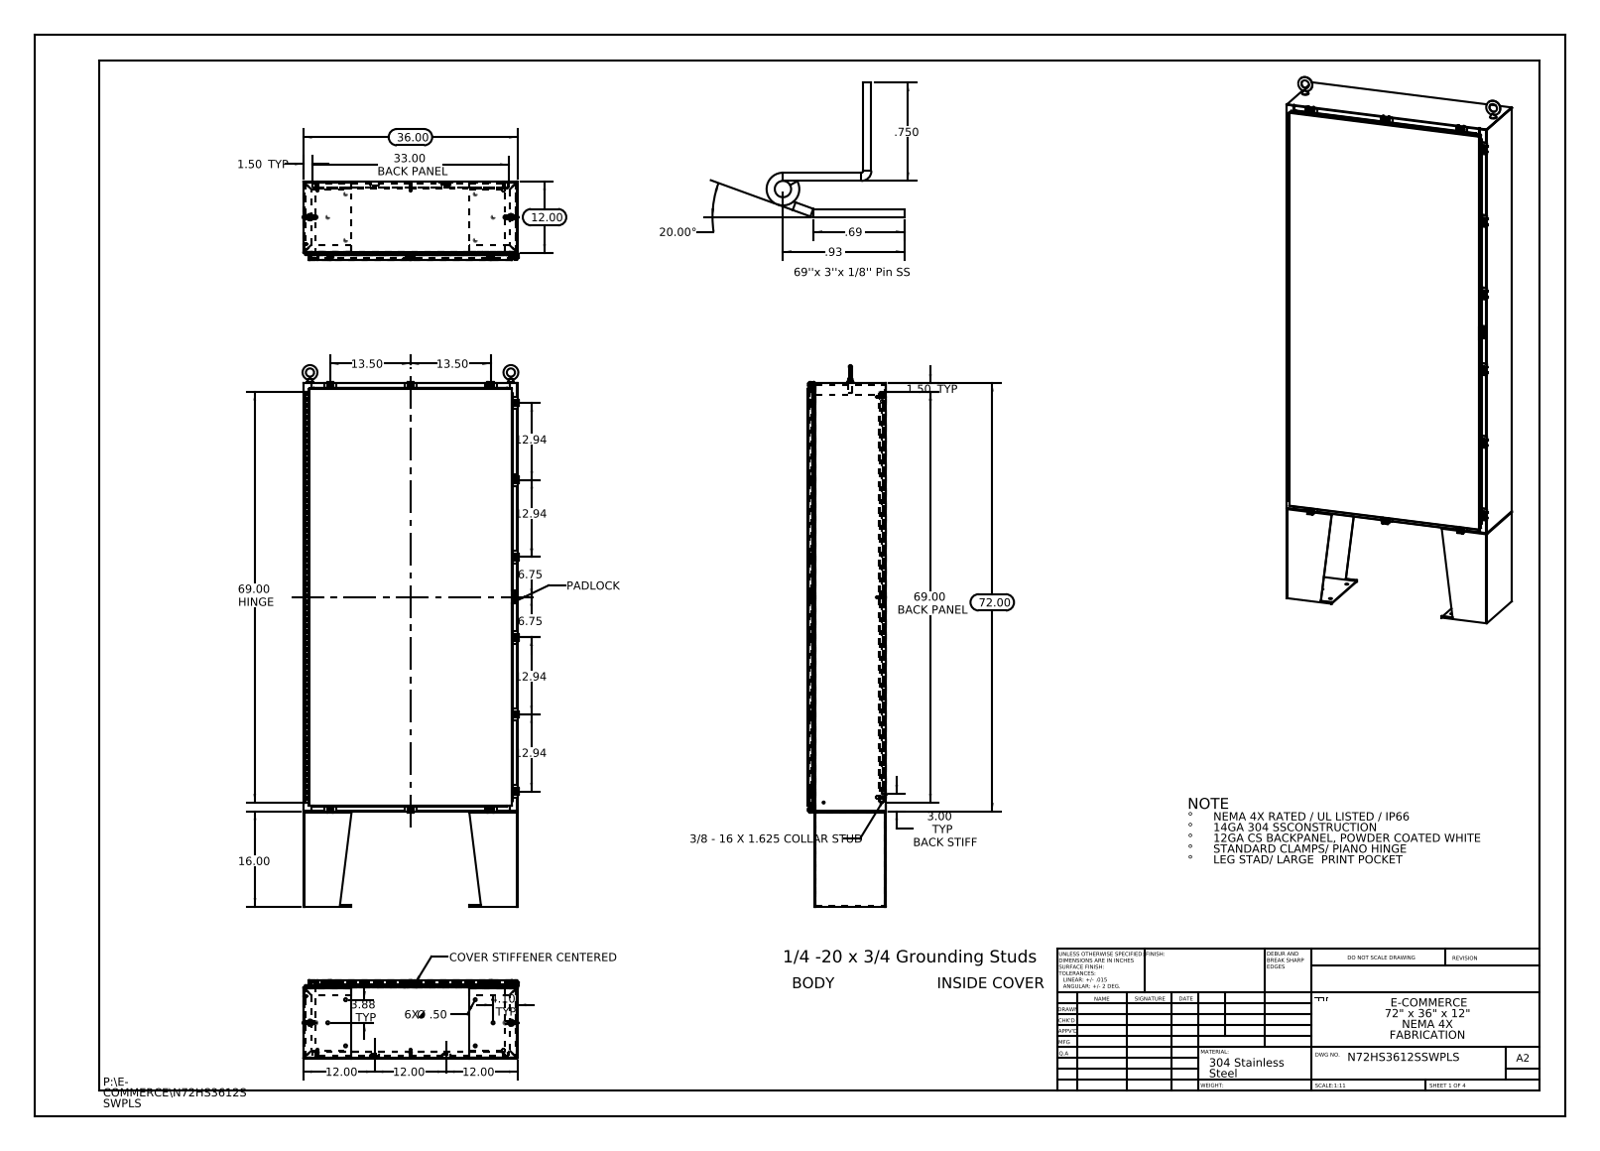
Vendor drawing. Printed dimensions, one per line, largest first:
72.00
69.00 HINGE
69.00 BACK PANEL
36.00
33.00 BACK PANEL
20.00°
16.00
13.50
13.50
12.94
12.94
12.94
12.94
12.00
12.00
12.00
12.00
6.75
6.75
4.10 TYP
3.88 TYP
3.00 TYP BACK STIFF
1.50 TYP
1.50 TYP
.93
.750
.69
6X Ø .50
